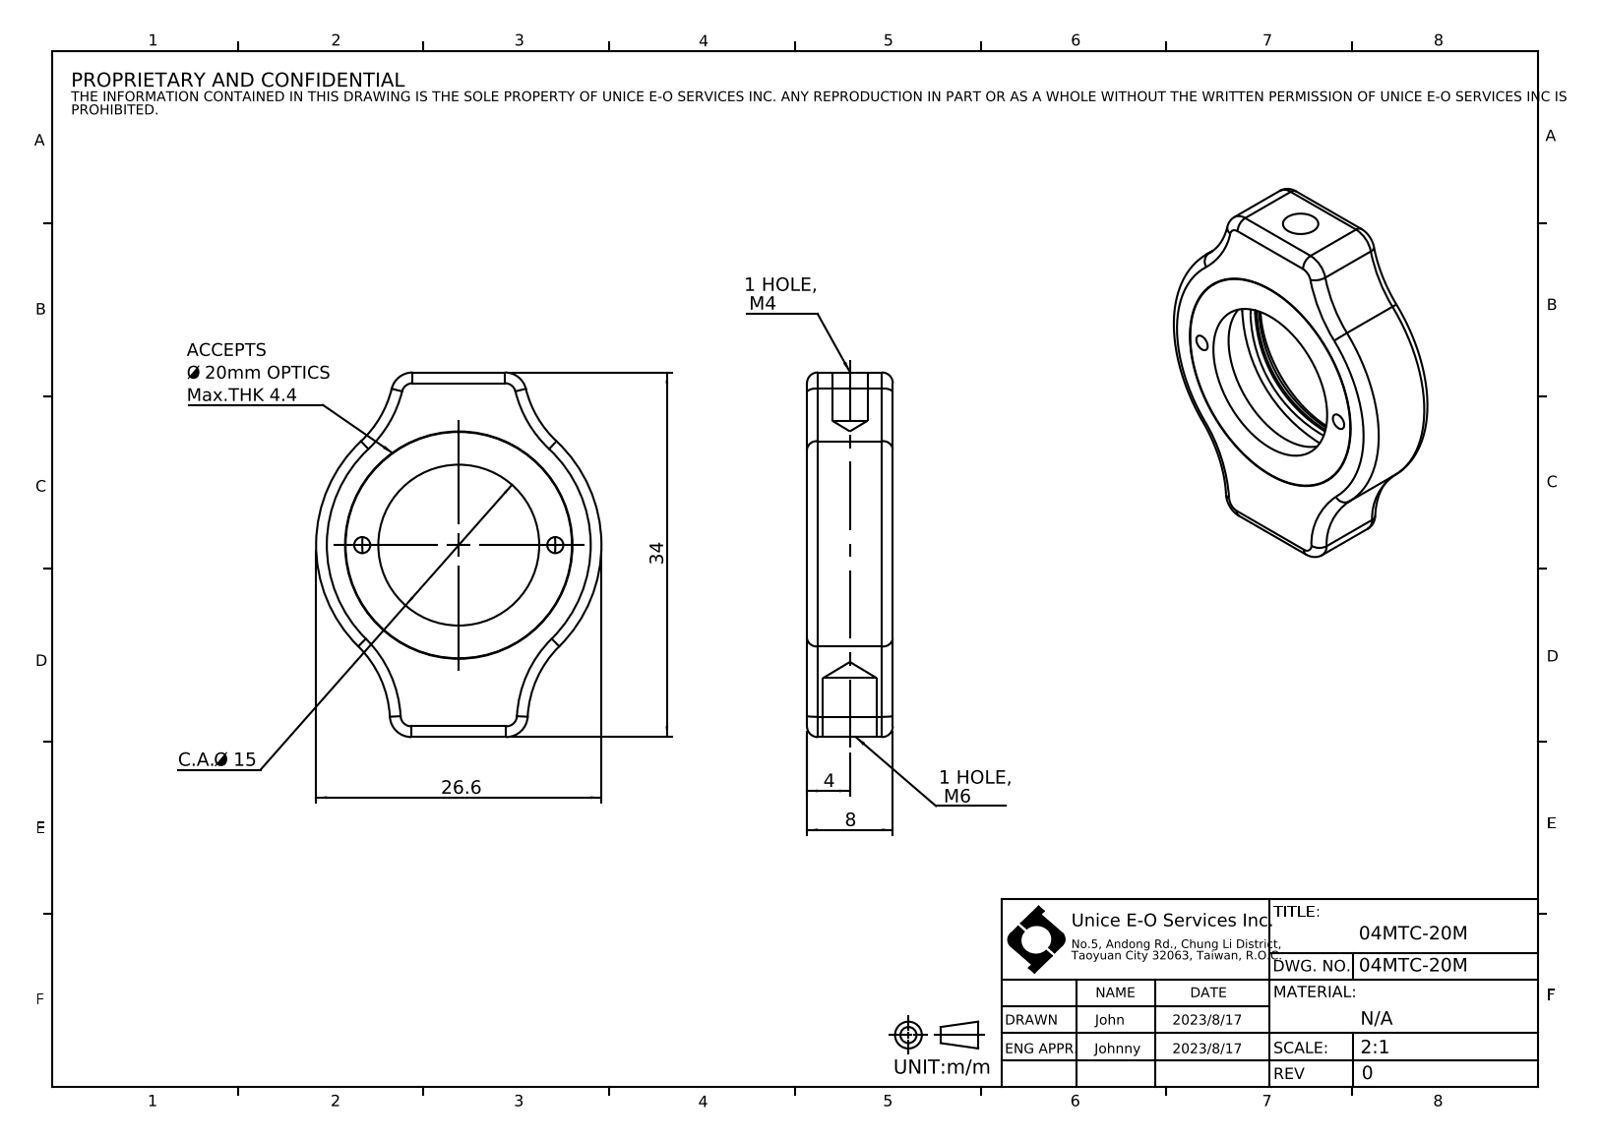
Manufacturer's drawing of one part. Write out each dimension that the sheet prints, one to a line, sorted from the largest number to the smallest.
34
26.6
C.A. Ø 15
8
4
